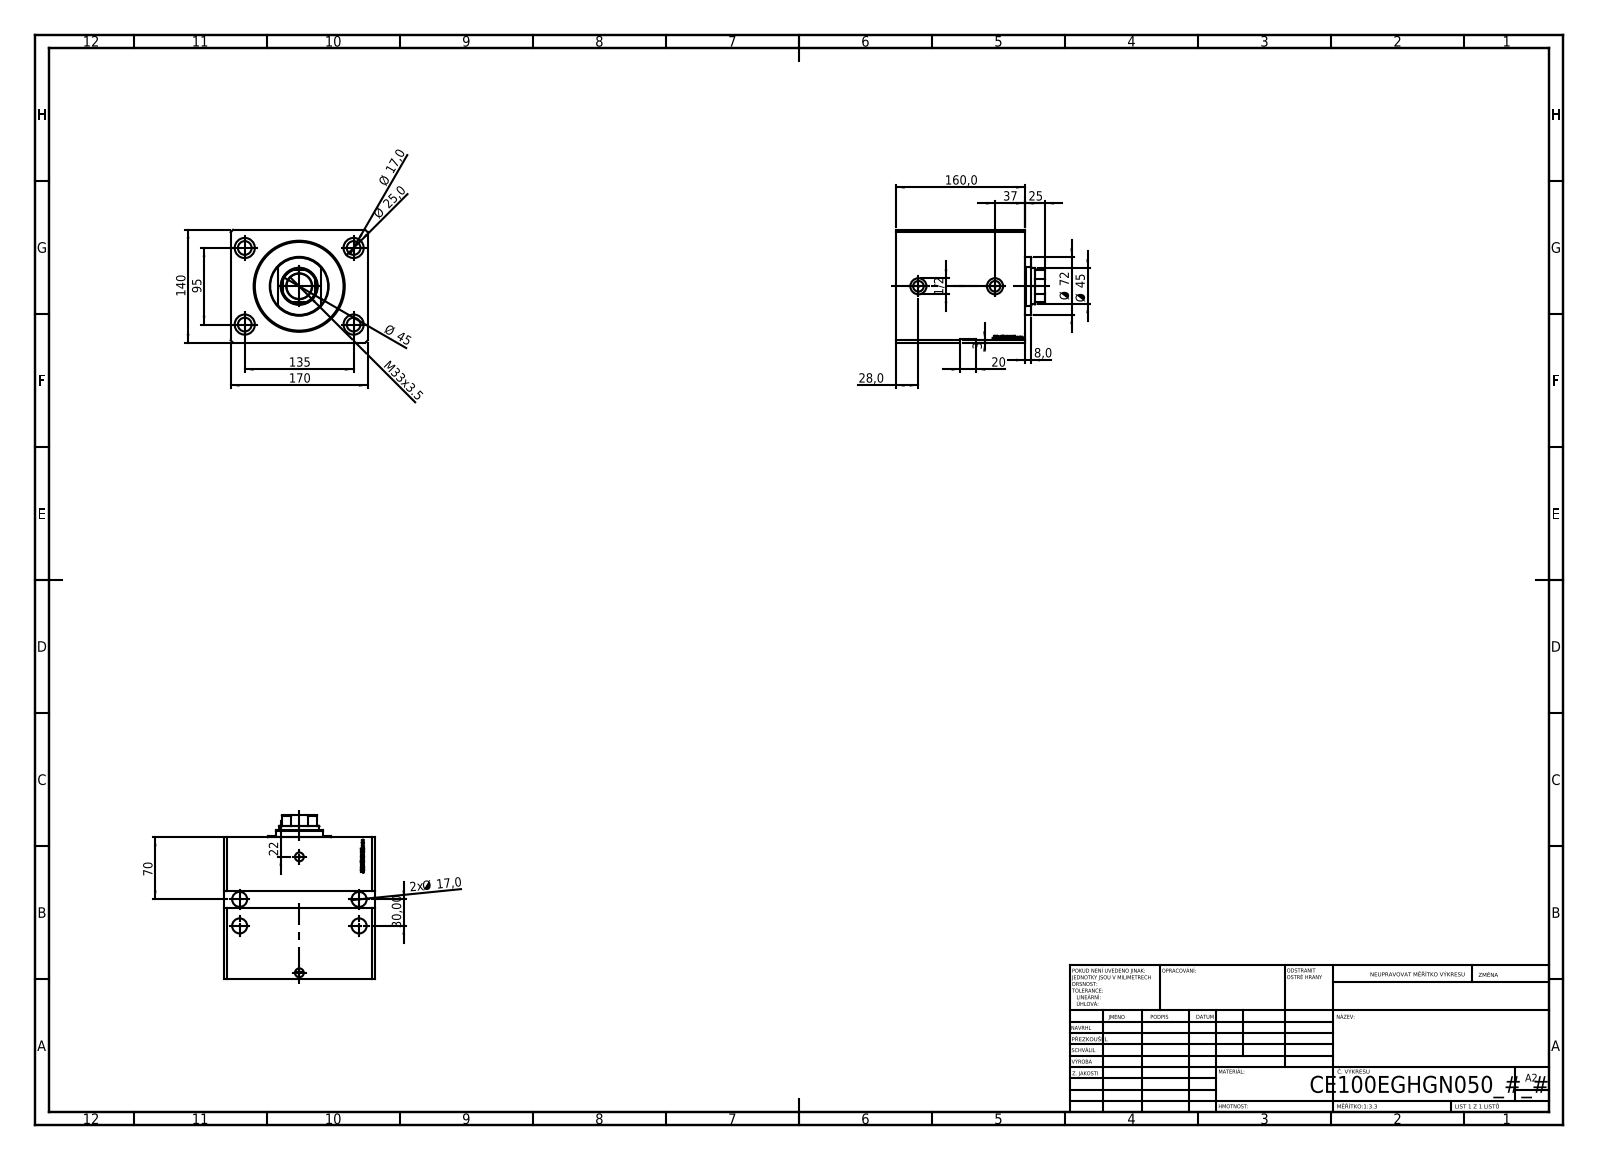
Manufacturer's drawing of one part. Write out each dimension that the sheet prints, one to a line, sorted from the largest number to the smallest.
170
160,0
140
135
95
Ø 72
70
Ø 45
Ø 45
37
M33x3.5
30,00
28,0
Ø 25,0
25
22
20
Ø 17,0
2x Ø 17,0
8,0
3
1/2
